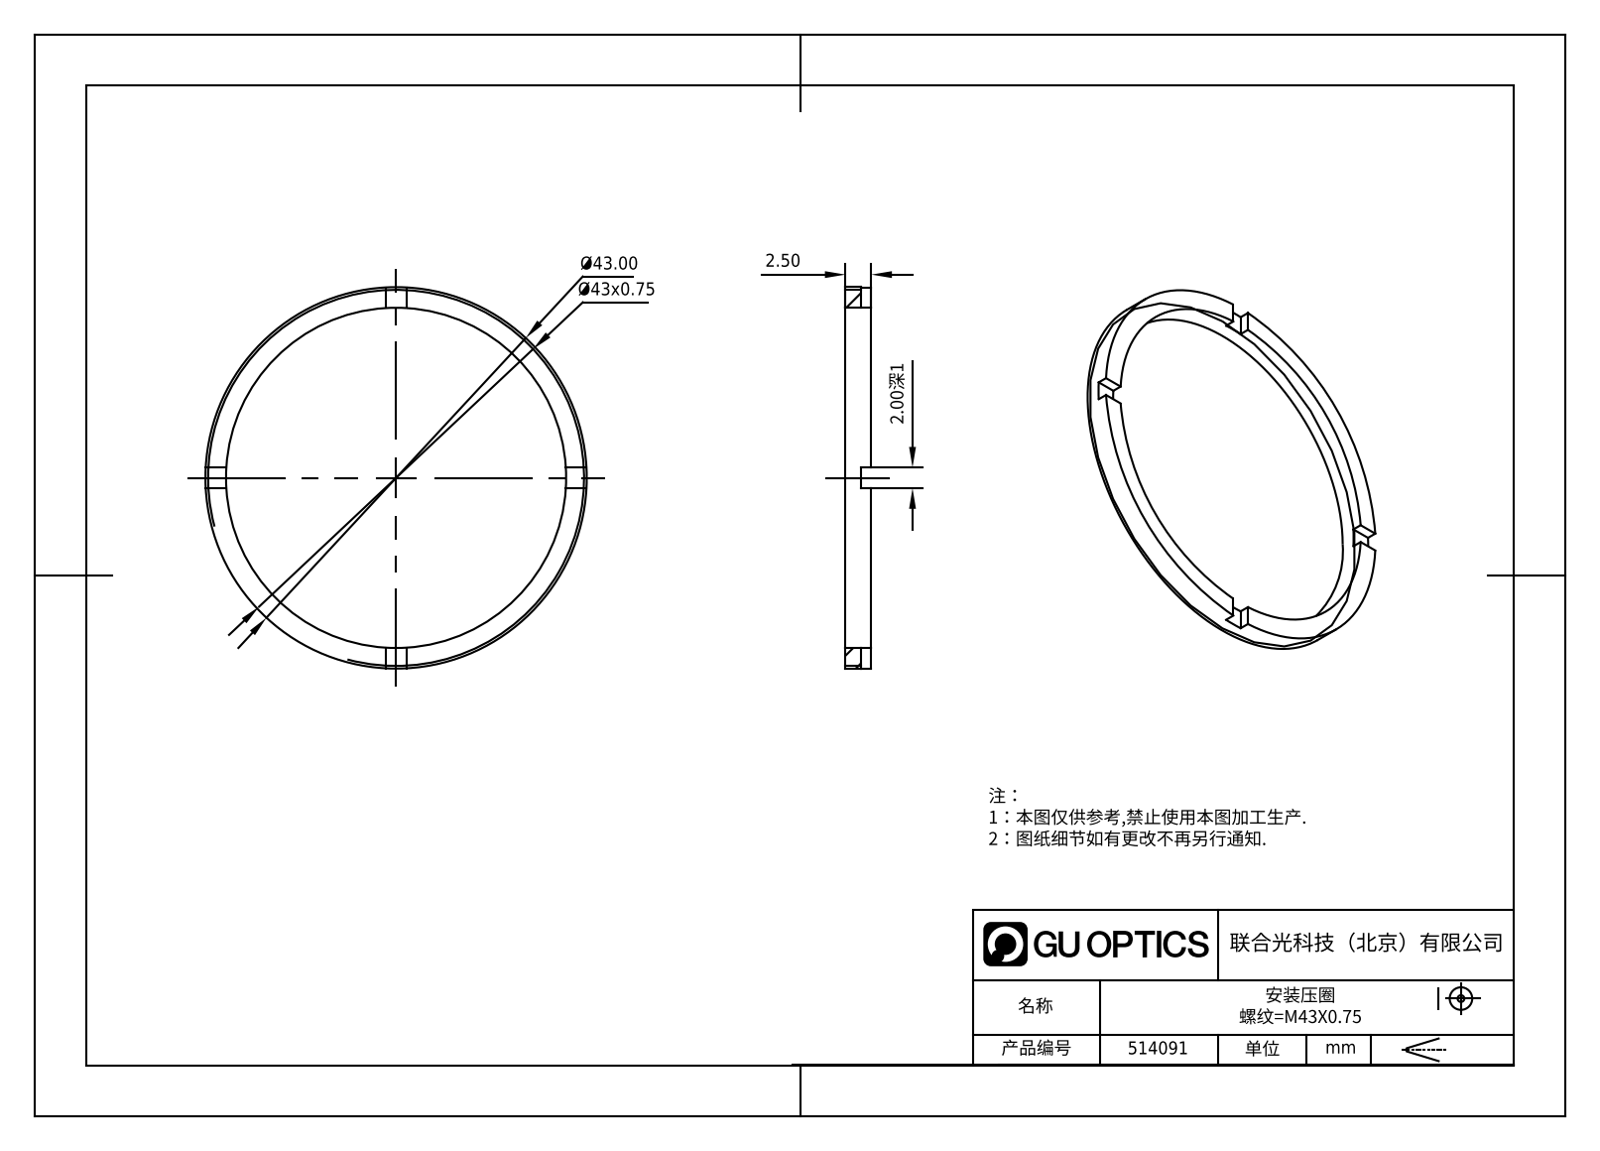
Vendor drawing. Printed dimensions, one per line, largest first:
Ø43.00
Ø43x0.75
2.50
2.00深1
